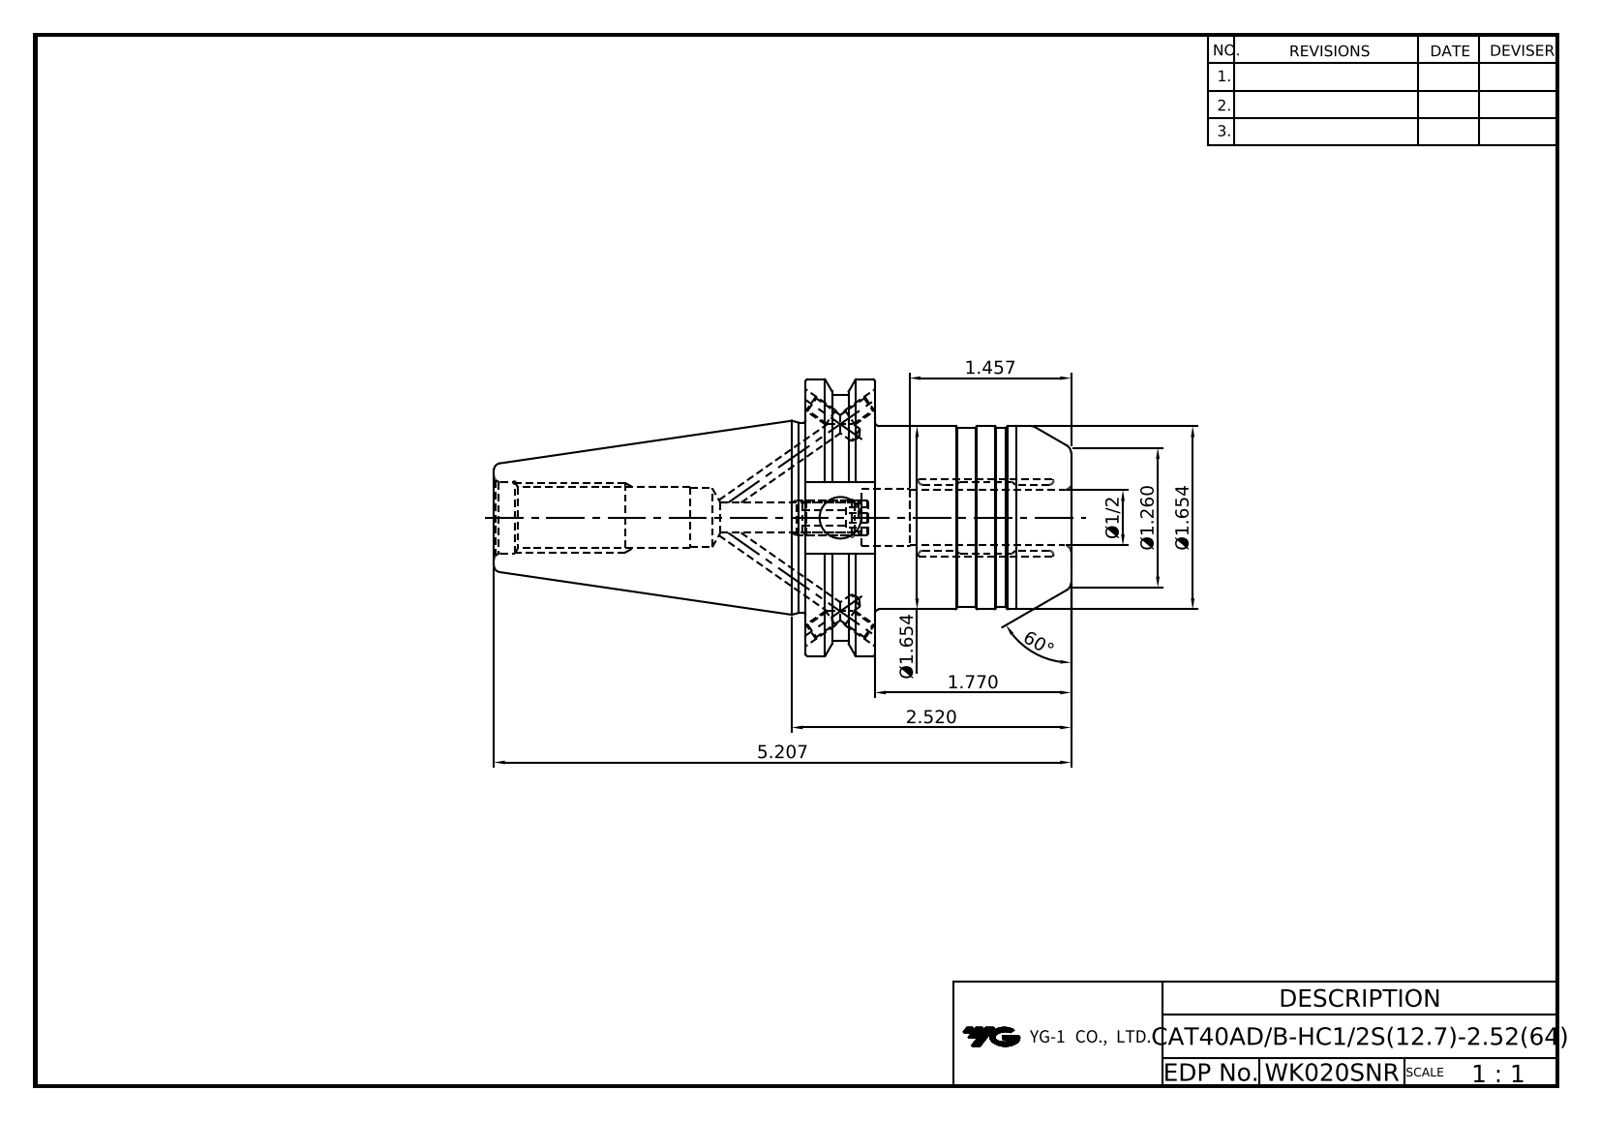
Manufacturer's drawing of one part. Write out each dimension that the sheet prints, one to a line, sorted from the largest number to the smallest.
60°
5.207
2.520
1.770
Ø1.654
Ø1.654
1.457
Ø1.260
Ø1/2
